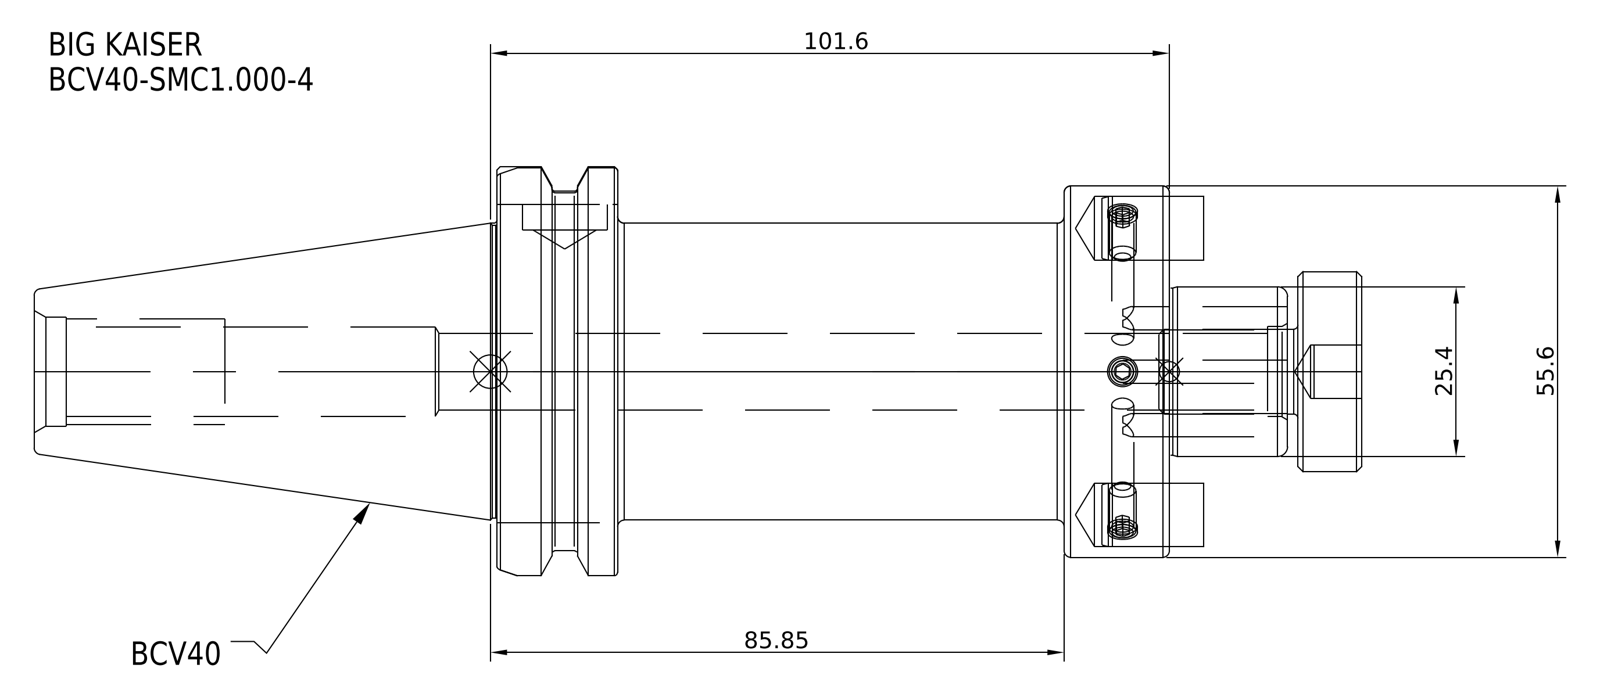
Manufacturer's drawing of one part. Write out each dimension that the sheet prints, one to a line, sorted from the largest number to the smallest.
101.6
85.85
55.6
25.4
